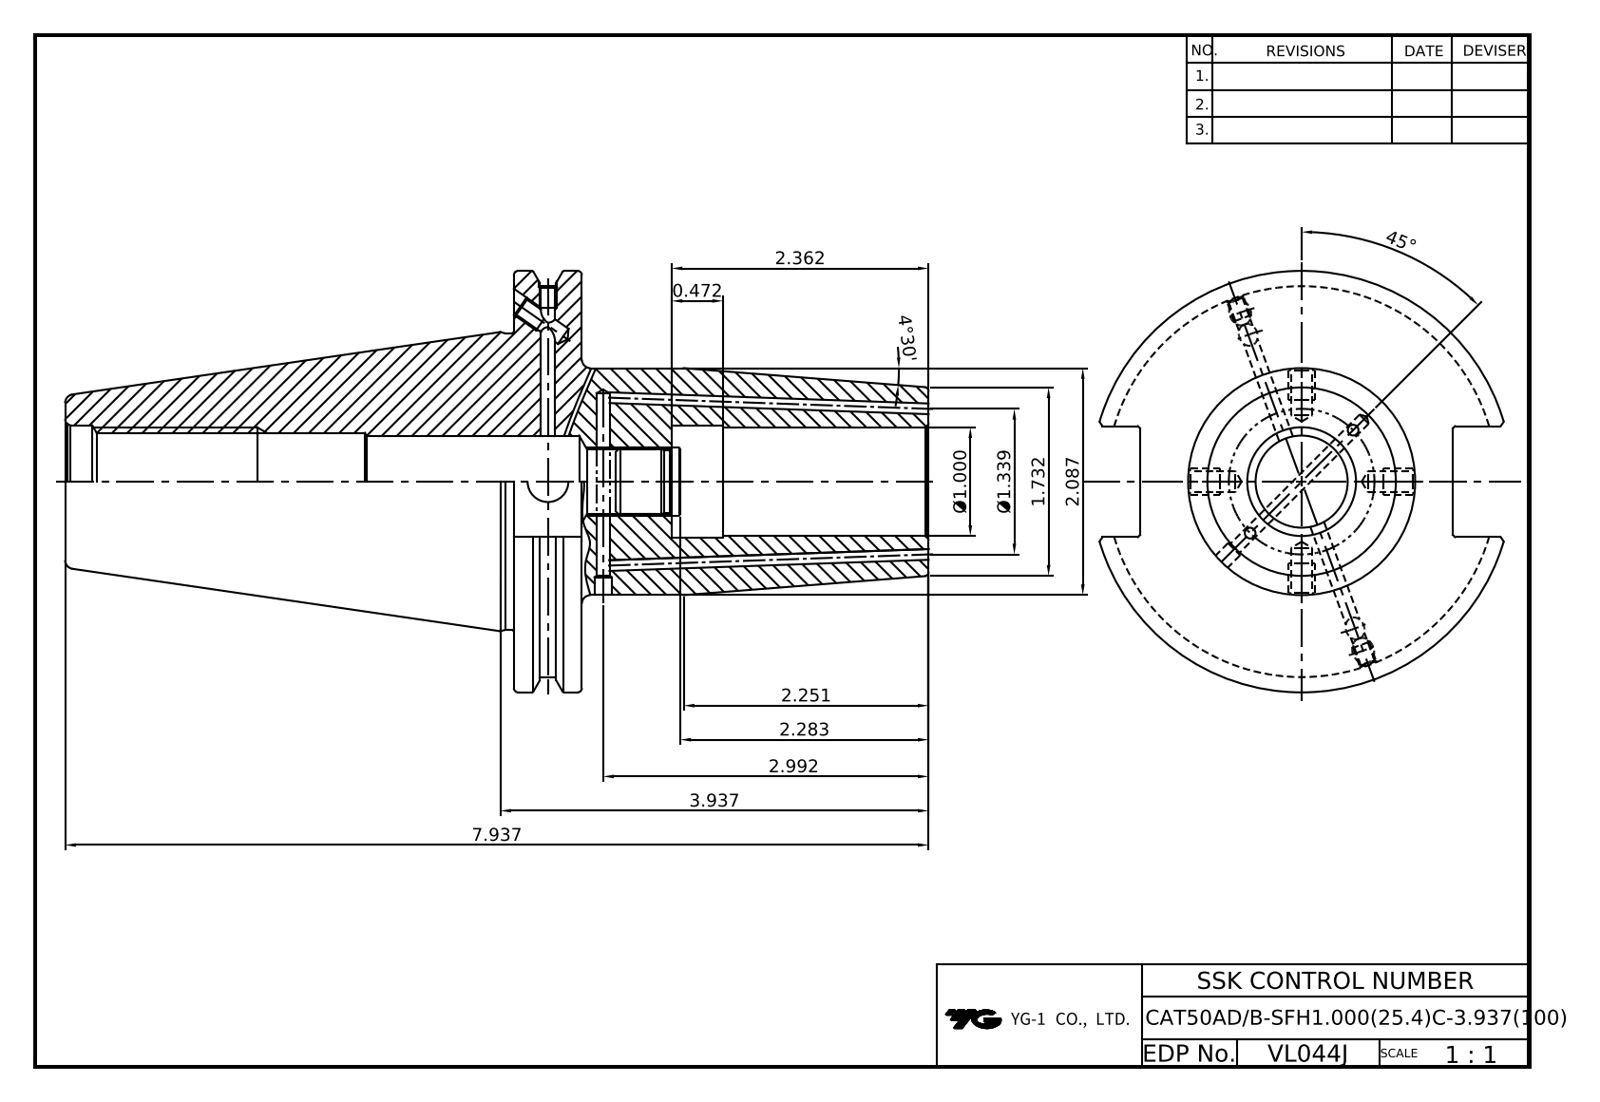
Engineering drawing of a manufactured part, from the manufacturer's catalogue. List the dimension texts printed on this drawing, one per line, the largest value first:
45°
7.937
4°30'
3.937
2.992
2.362
2.283
2.251
2.087
1.732
Ø1.339
Ø1.000
0.472
